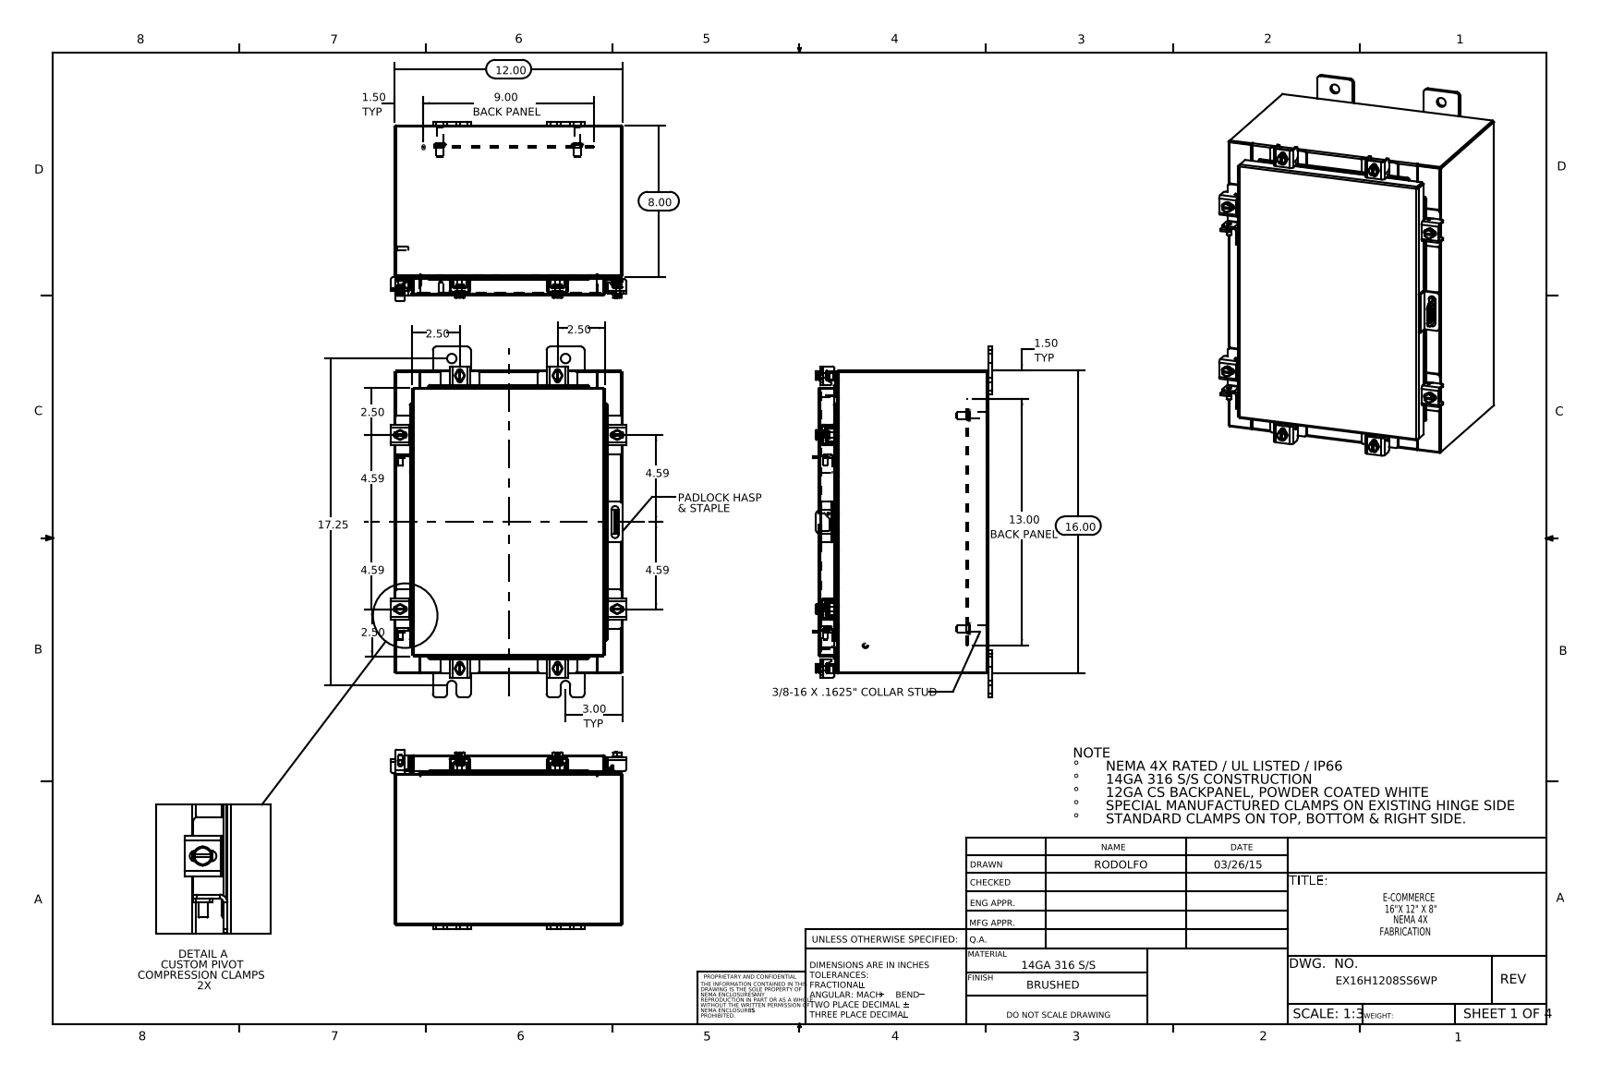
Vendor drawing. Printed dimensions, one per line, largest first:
17.25
16.00
13.00 BACK PANEL
12.00
9.00 BACK PANEL
8.00
4.59
4.59
4.59
4.59
3.00 TYP
2.50
2.50
2.50
2.50
1.50 TYP
1.50 TYP
